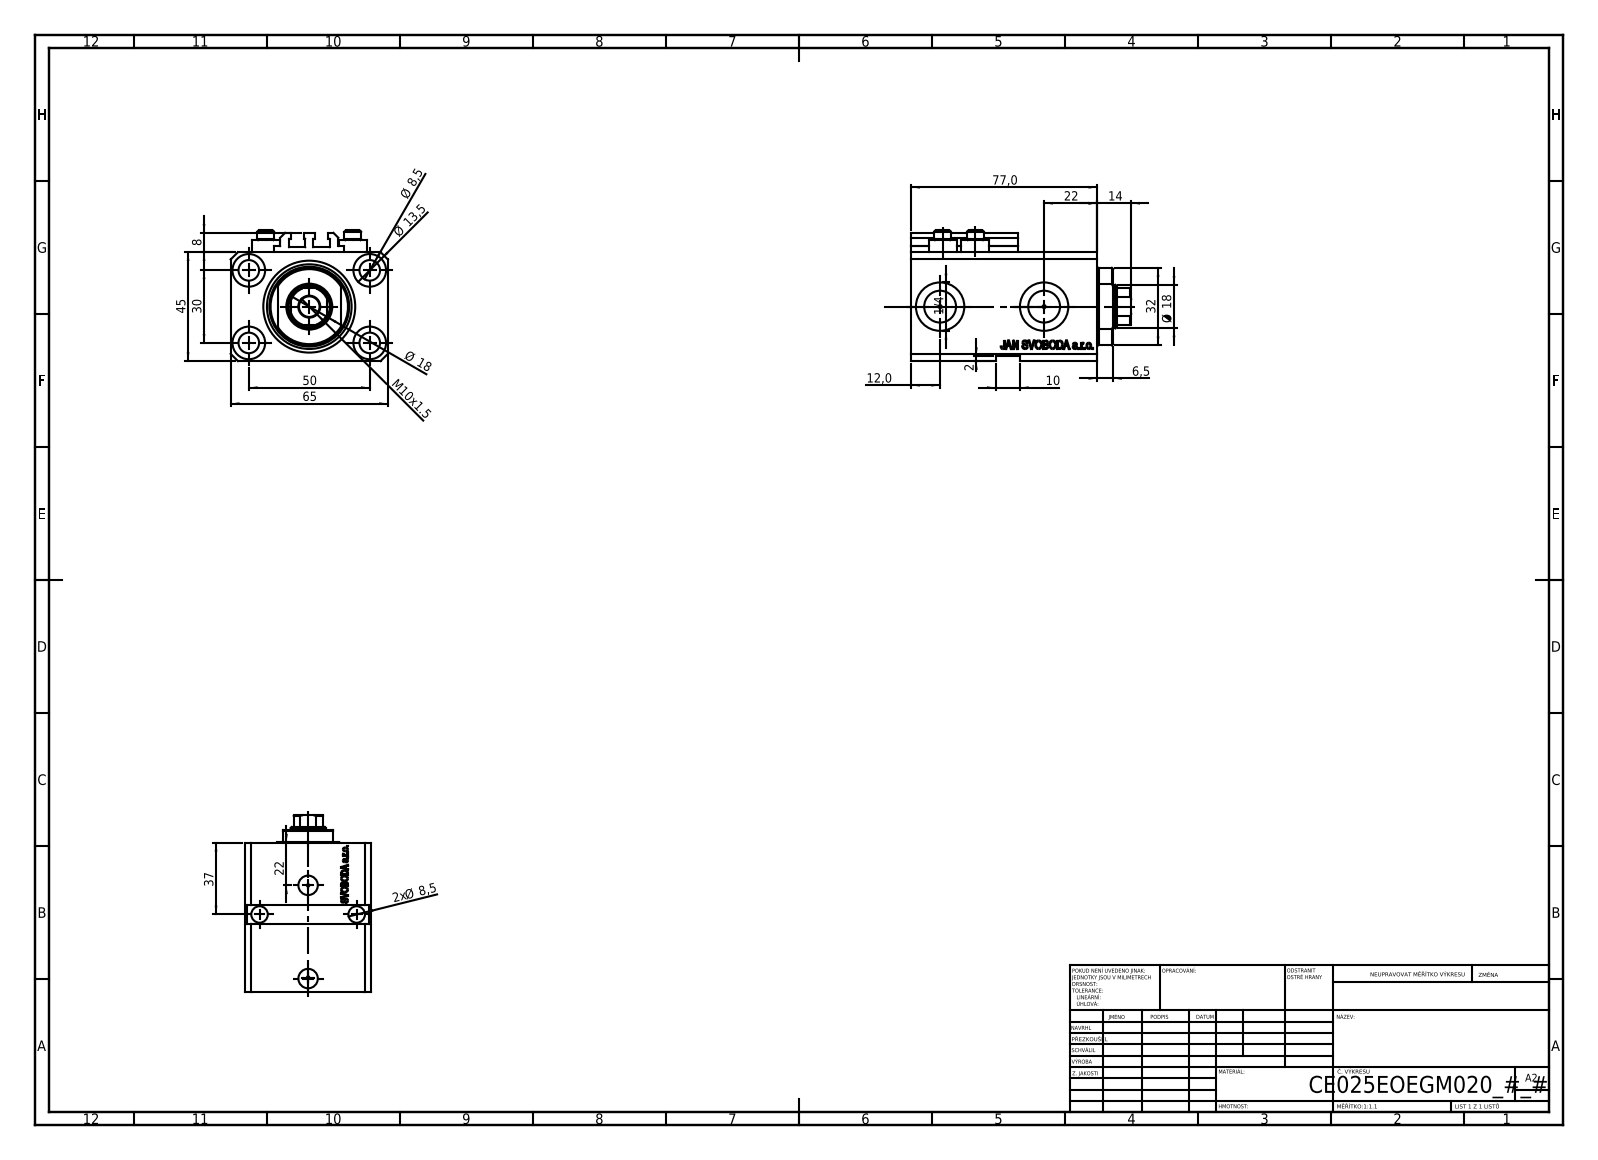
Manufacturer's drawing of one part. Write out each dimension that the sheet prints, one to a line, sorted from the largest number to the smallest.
77,0
65
50
45
37
32
30
22
22
Ø 18
Ø 18
14
Ø 13,5
12,0
M10x1.5
10
Ø 8,5
2x Ø 8,5
8
6,5
2
1/4
